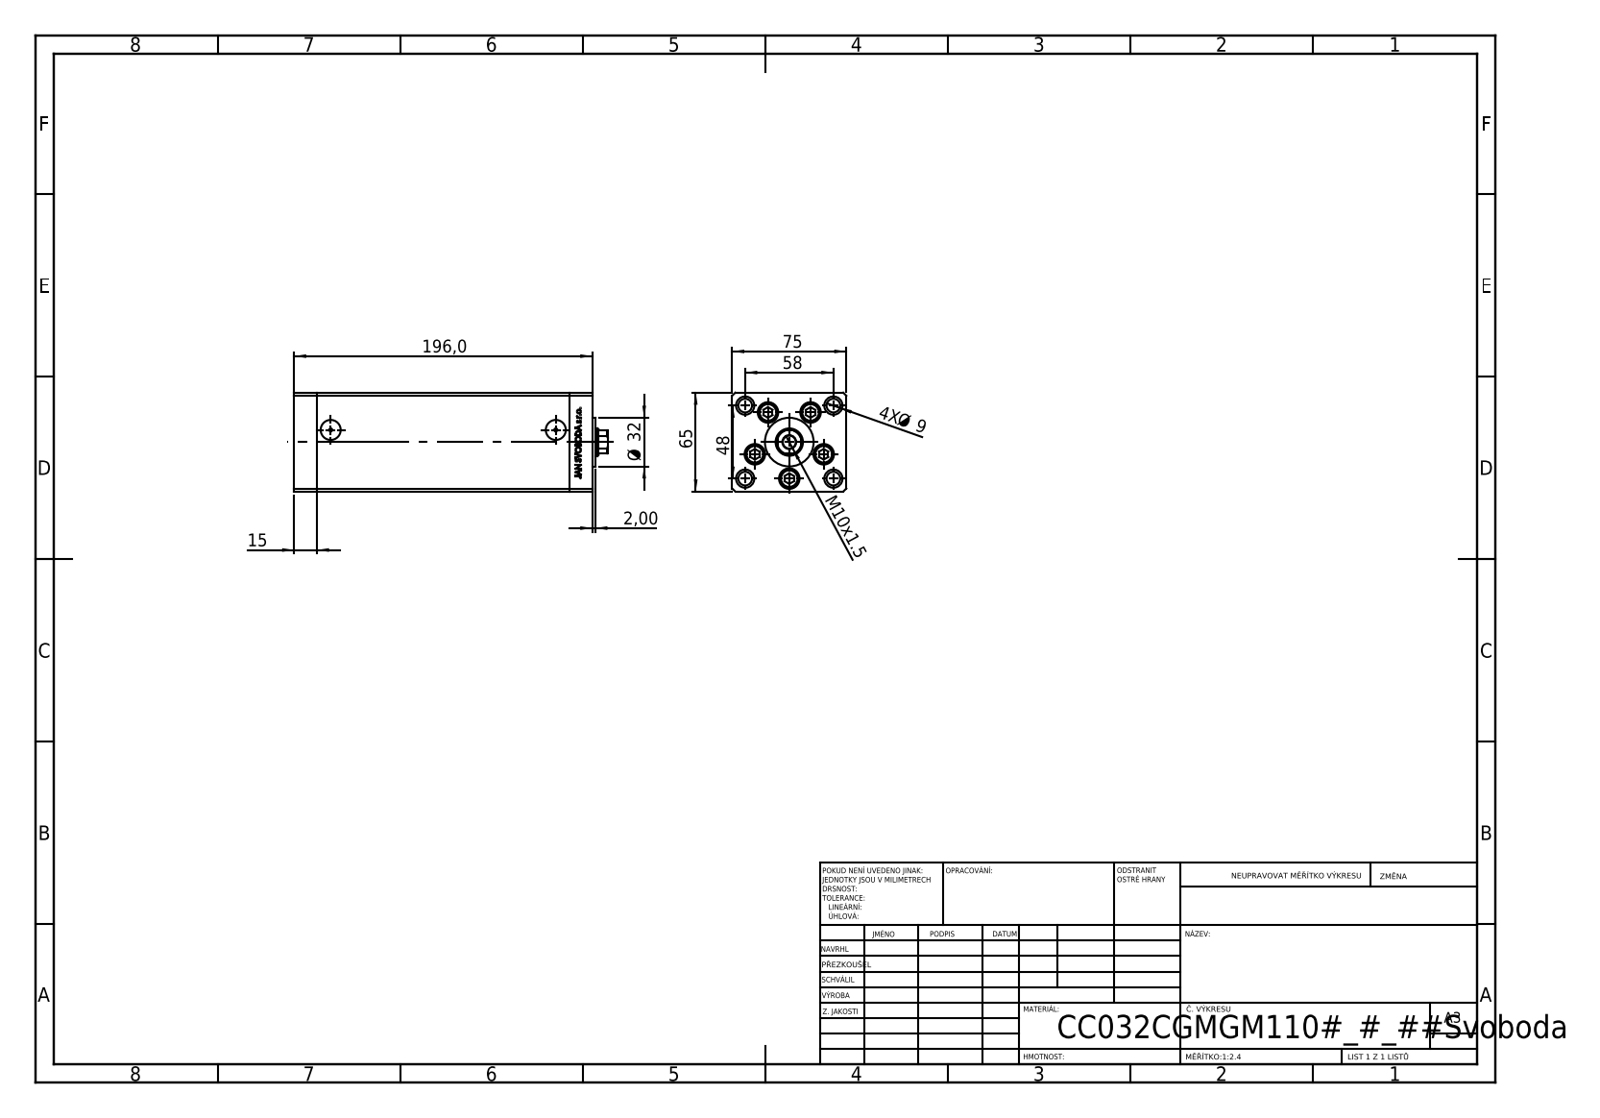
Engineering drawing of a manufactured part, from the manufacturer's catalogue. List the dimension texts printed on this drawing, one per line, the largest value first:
196,0
75
65
58
48
Ø 32
15
M10x1.5
4X Ø 9
2,00
